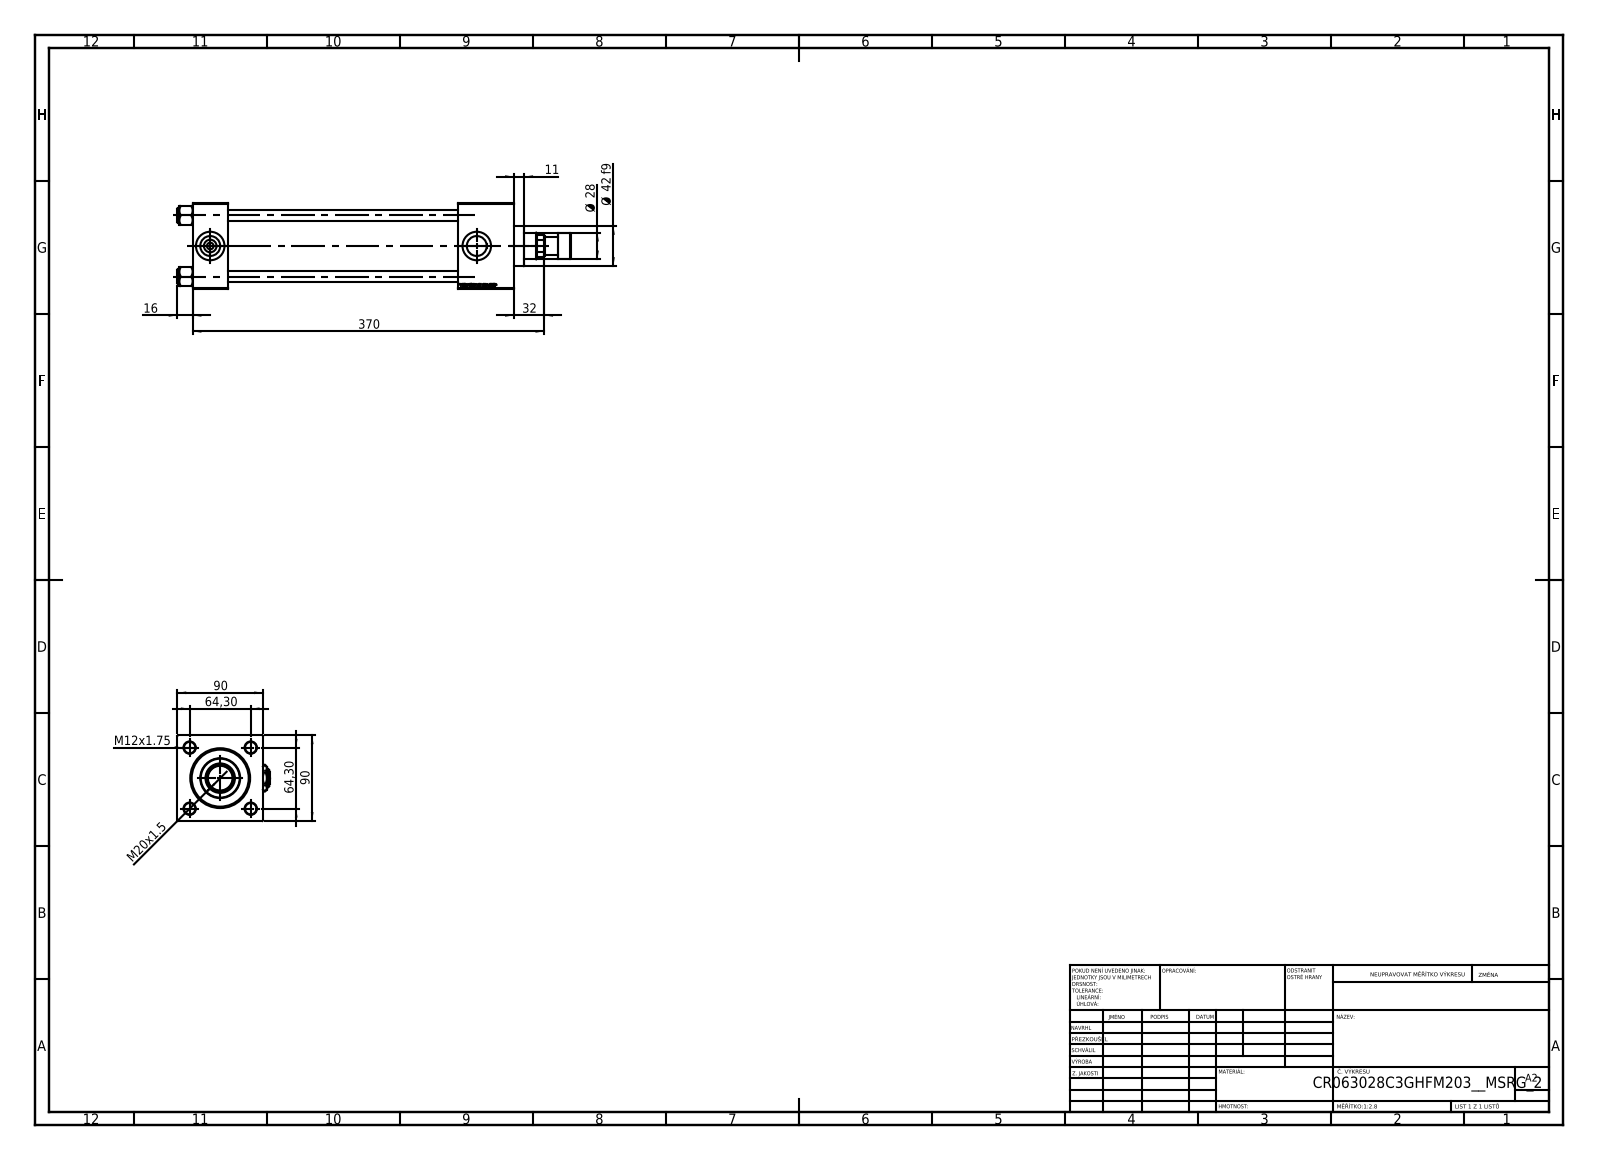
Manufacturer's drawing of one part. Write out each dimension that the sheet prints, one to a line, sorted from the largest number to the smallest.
370
90
90
64,30
64,30
Ø 42 f9
32
Ø 28
M20x1.5
16
M12x1.75
11
